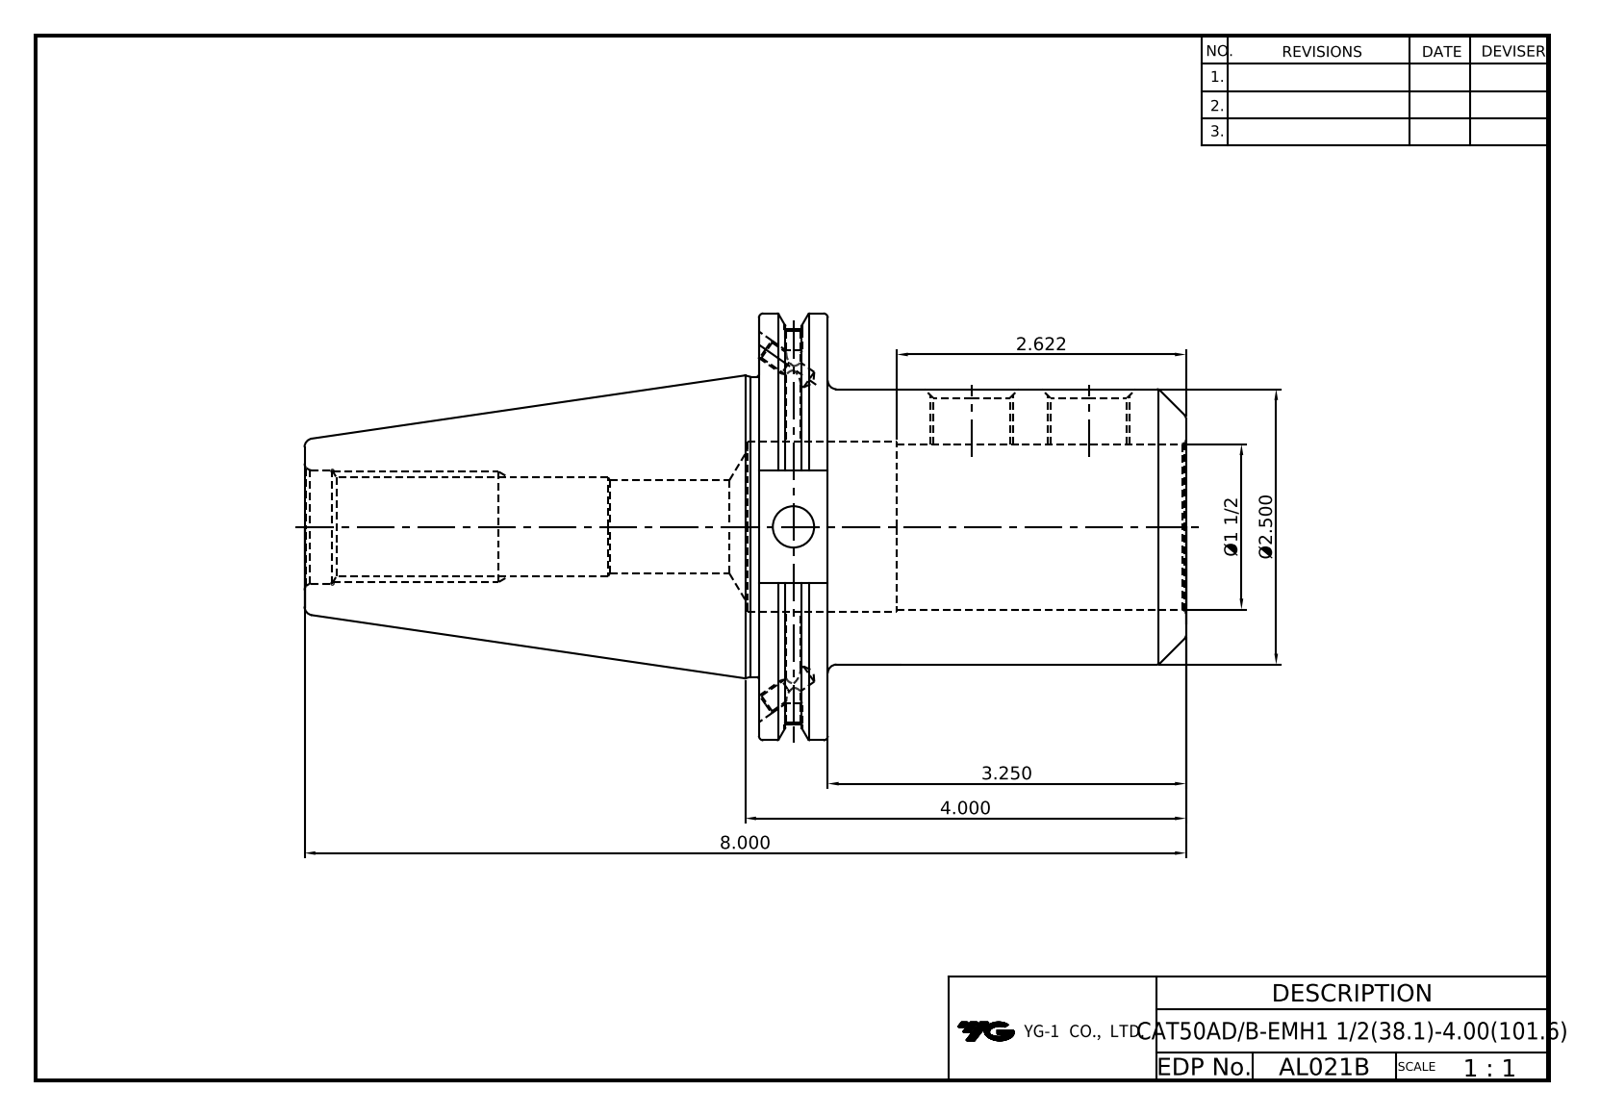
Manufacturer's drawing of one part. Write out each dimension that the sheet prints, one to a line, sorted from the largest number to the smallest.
8.000
4.000
3.250
2.622
Ø2.500
Ø1 1/2
